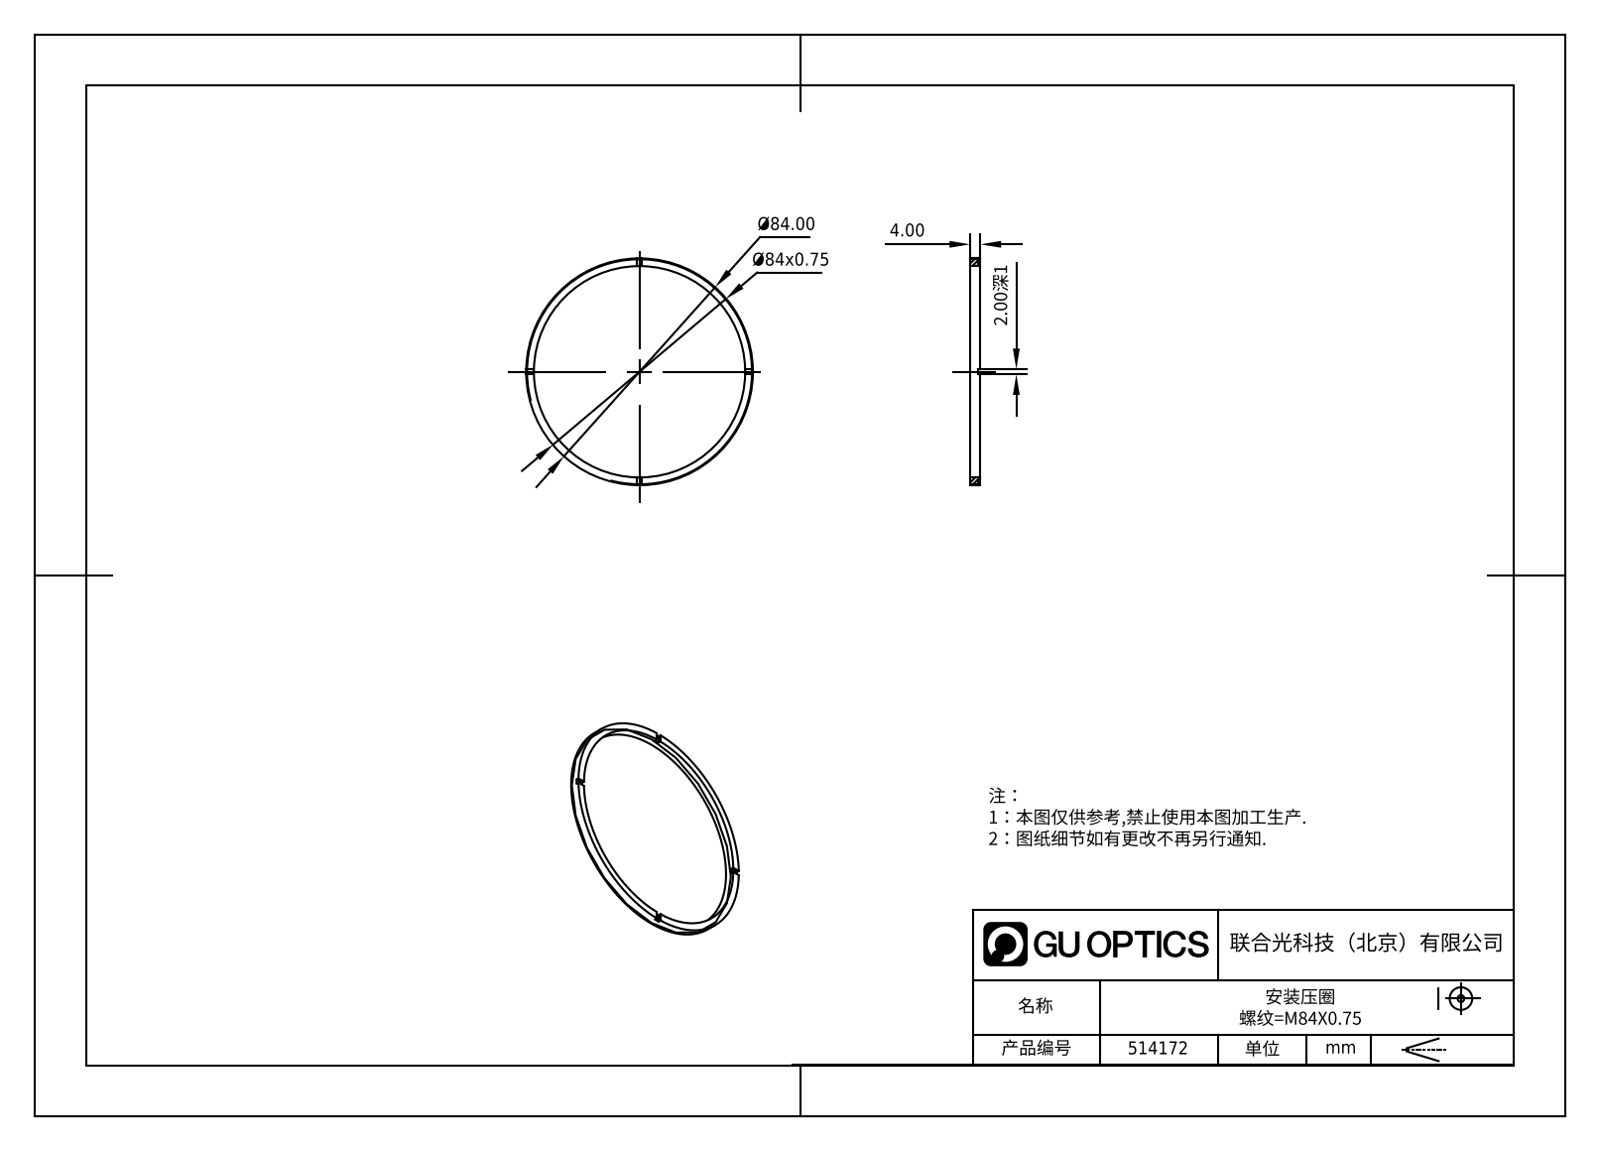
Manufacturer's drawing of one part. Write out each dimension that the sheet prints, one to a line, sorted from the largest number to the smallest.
Ø84.00
Ø84x0.75
4.00
2.00深1
